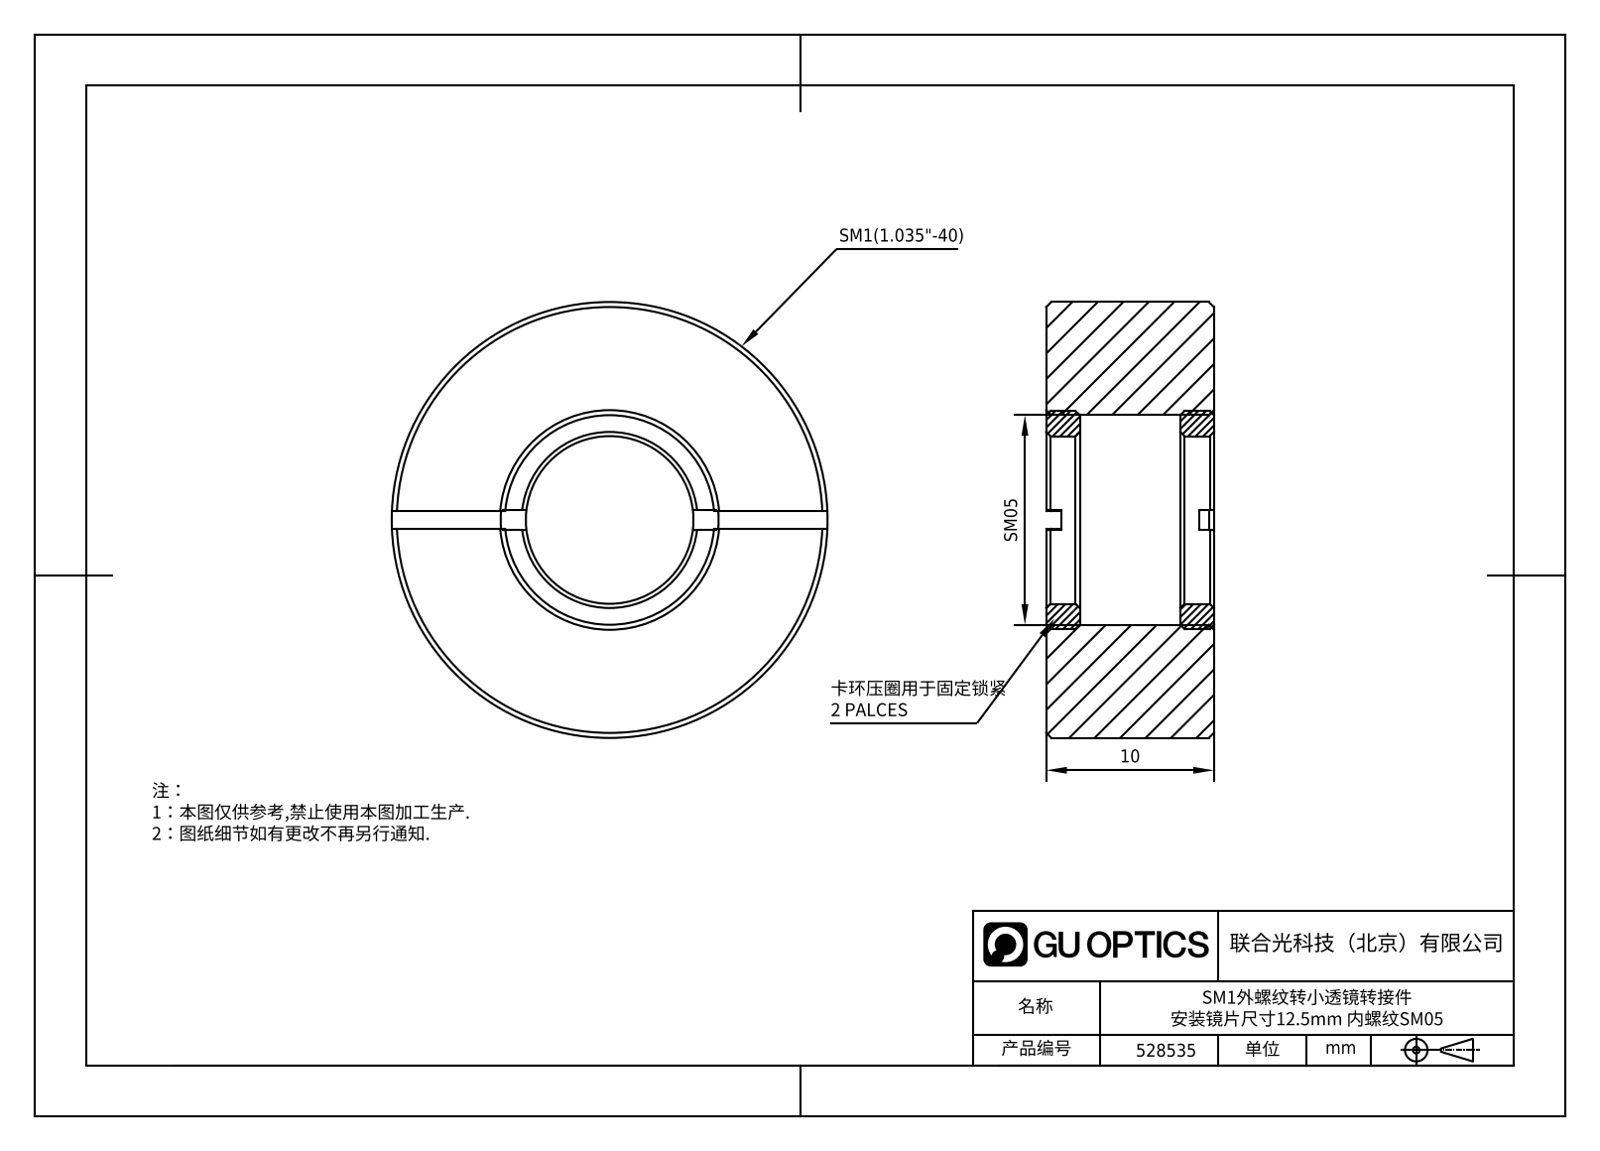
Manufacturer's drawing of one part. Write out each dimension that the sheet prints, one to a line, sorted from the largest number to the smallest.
10
SM05
